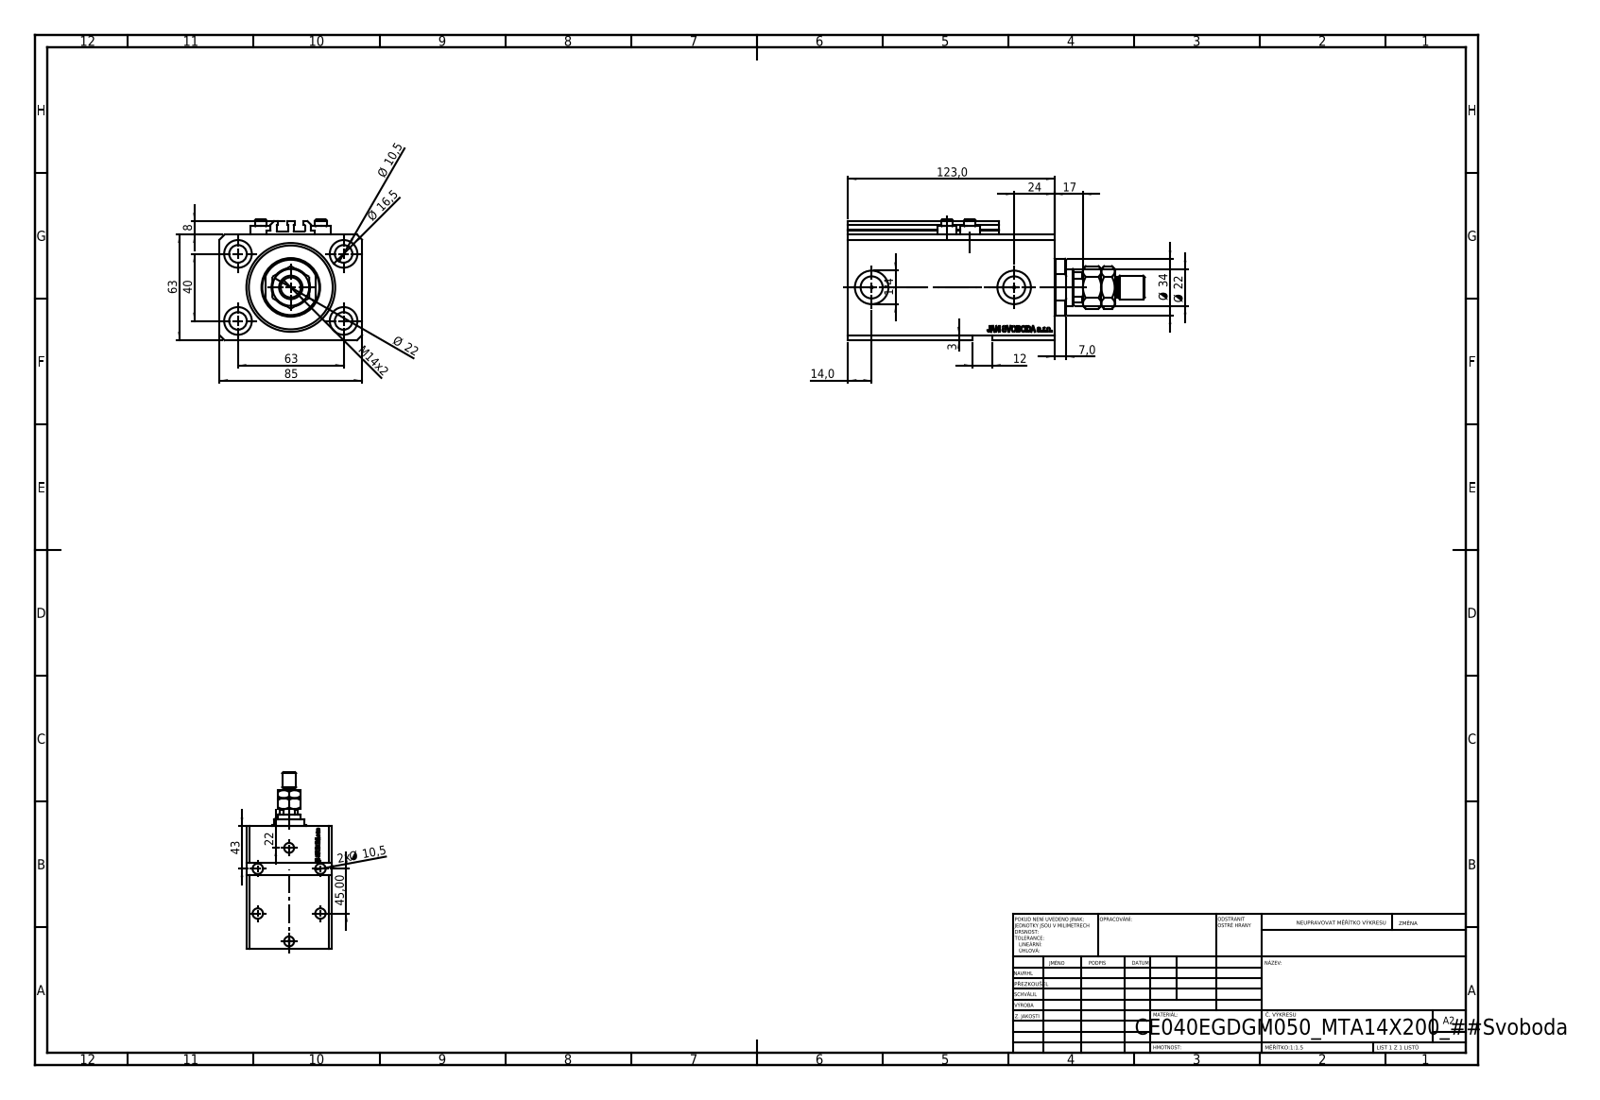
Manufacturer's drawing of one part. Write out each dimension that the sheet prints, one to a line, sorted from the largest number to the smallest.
123,0
85
63
63
45,00
43
40
Ø 34
24
Ø 22
Ø 22
22
17
Ø 16,5
M14x2
14,0
12
Ø 10,5
2x Ø 10,5
8
7,0
3
1/4
